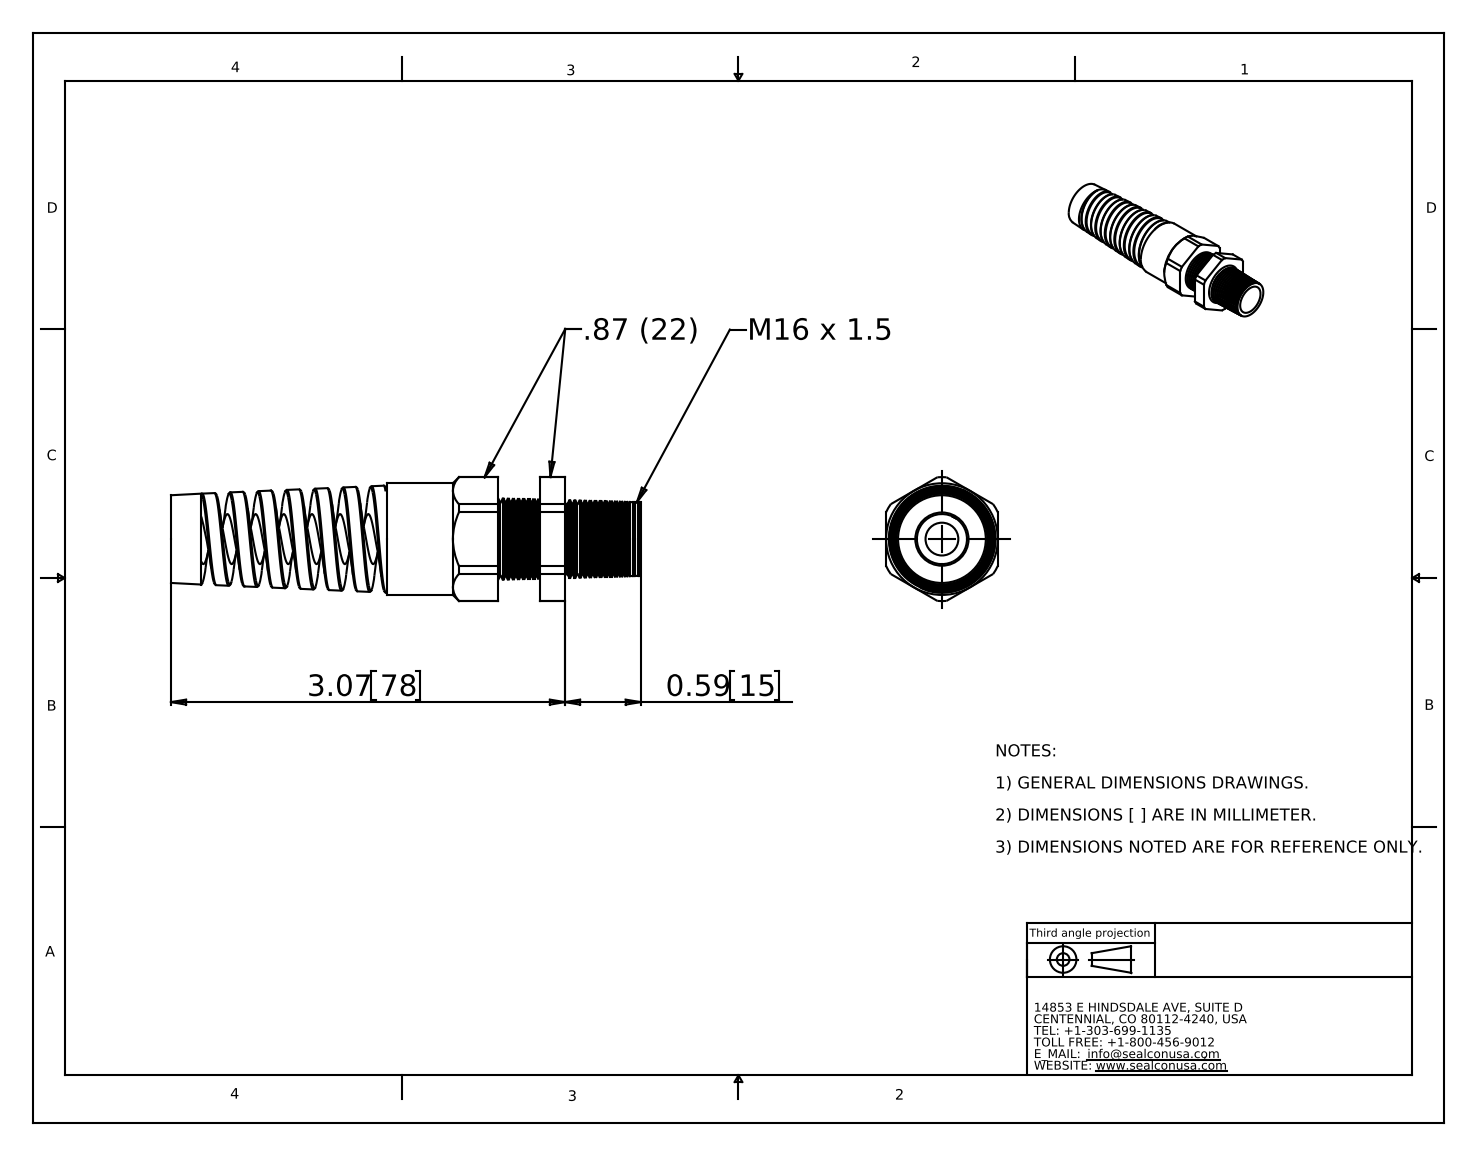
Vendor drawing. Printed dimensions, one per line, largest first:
3.07 78
0.59 15
